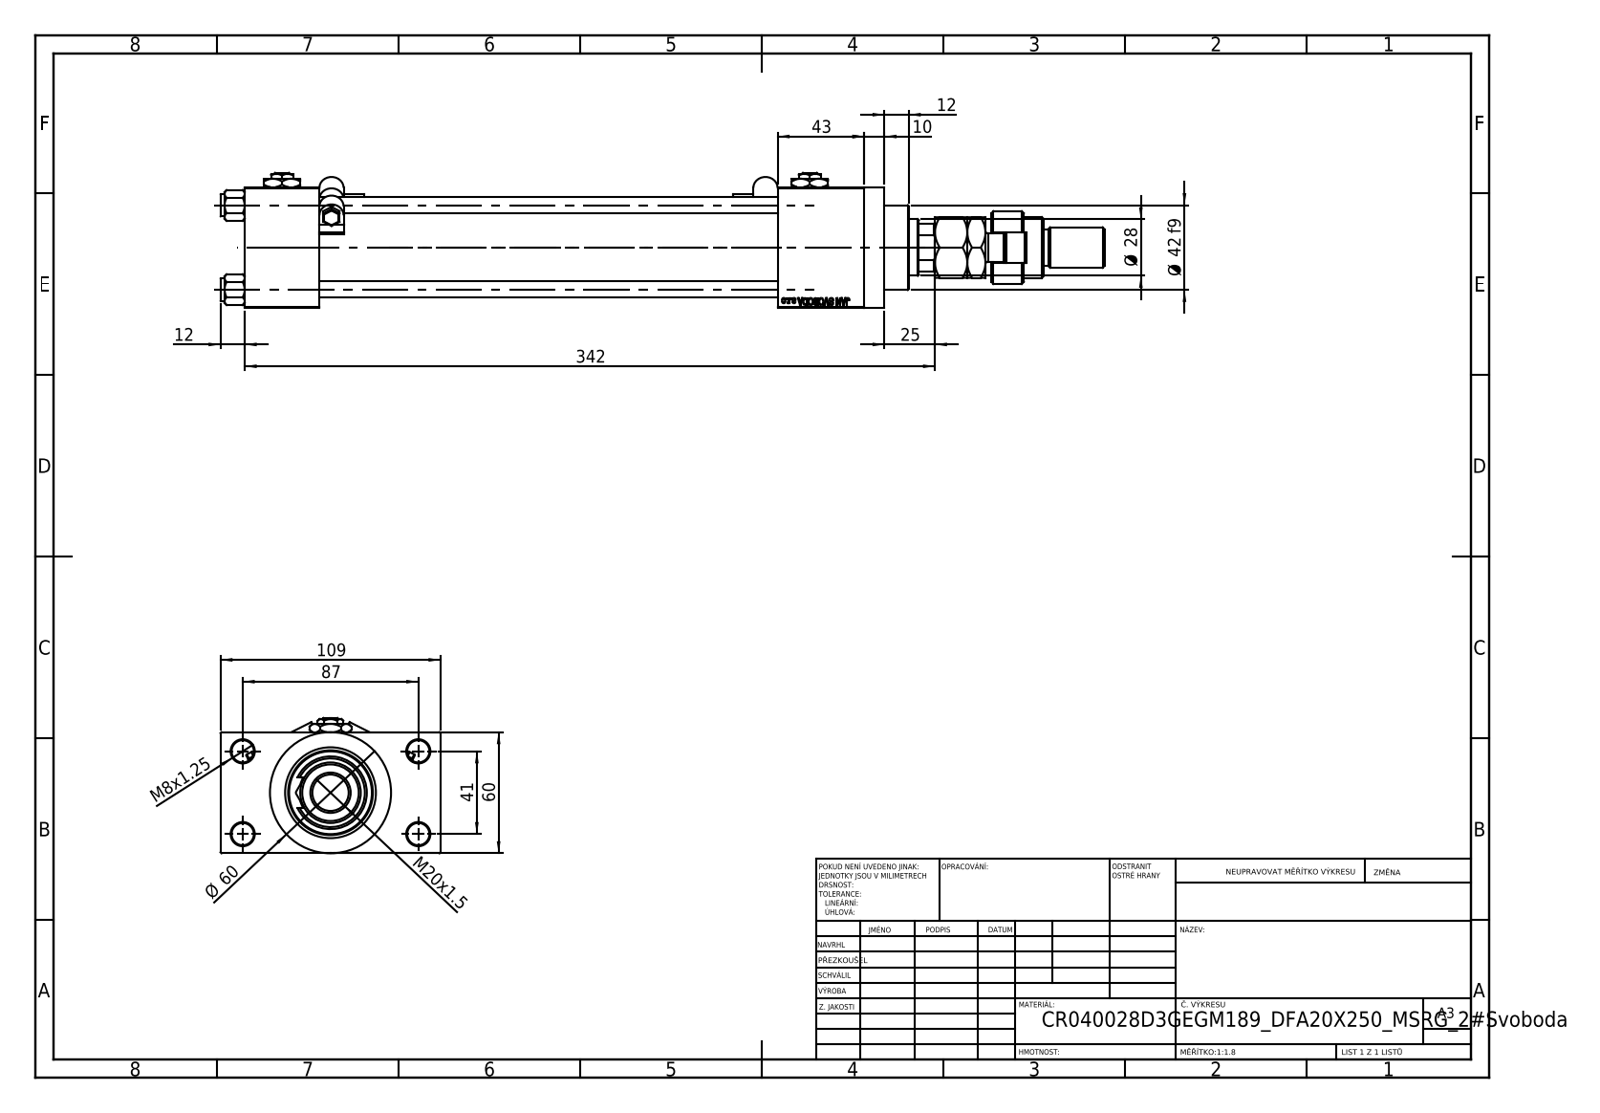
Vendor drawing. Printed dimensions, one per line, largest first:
342
109
87
Ø 60
60
43
Ø 42 f9
41
Ø 28
25
M20x1.5
12
12
10
M8x1.25
